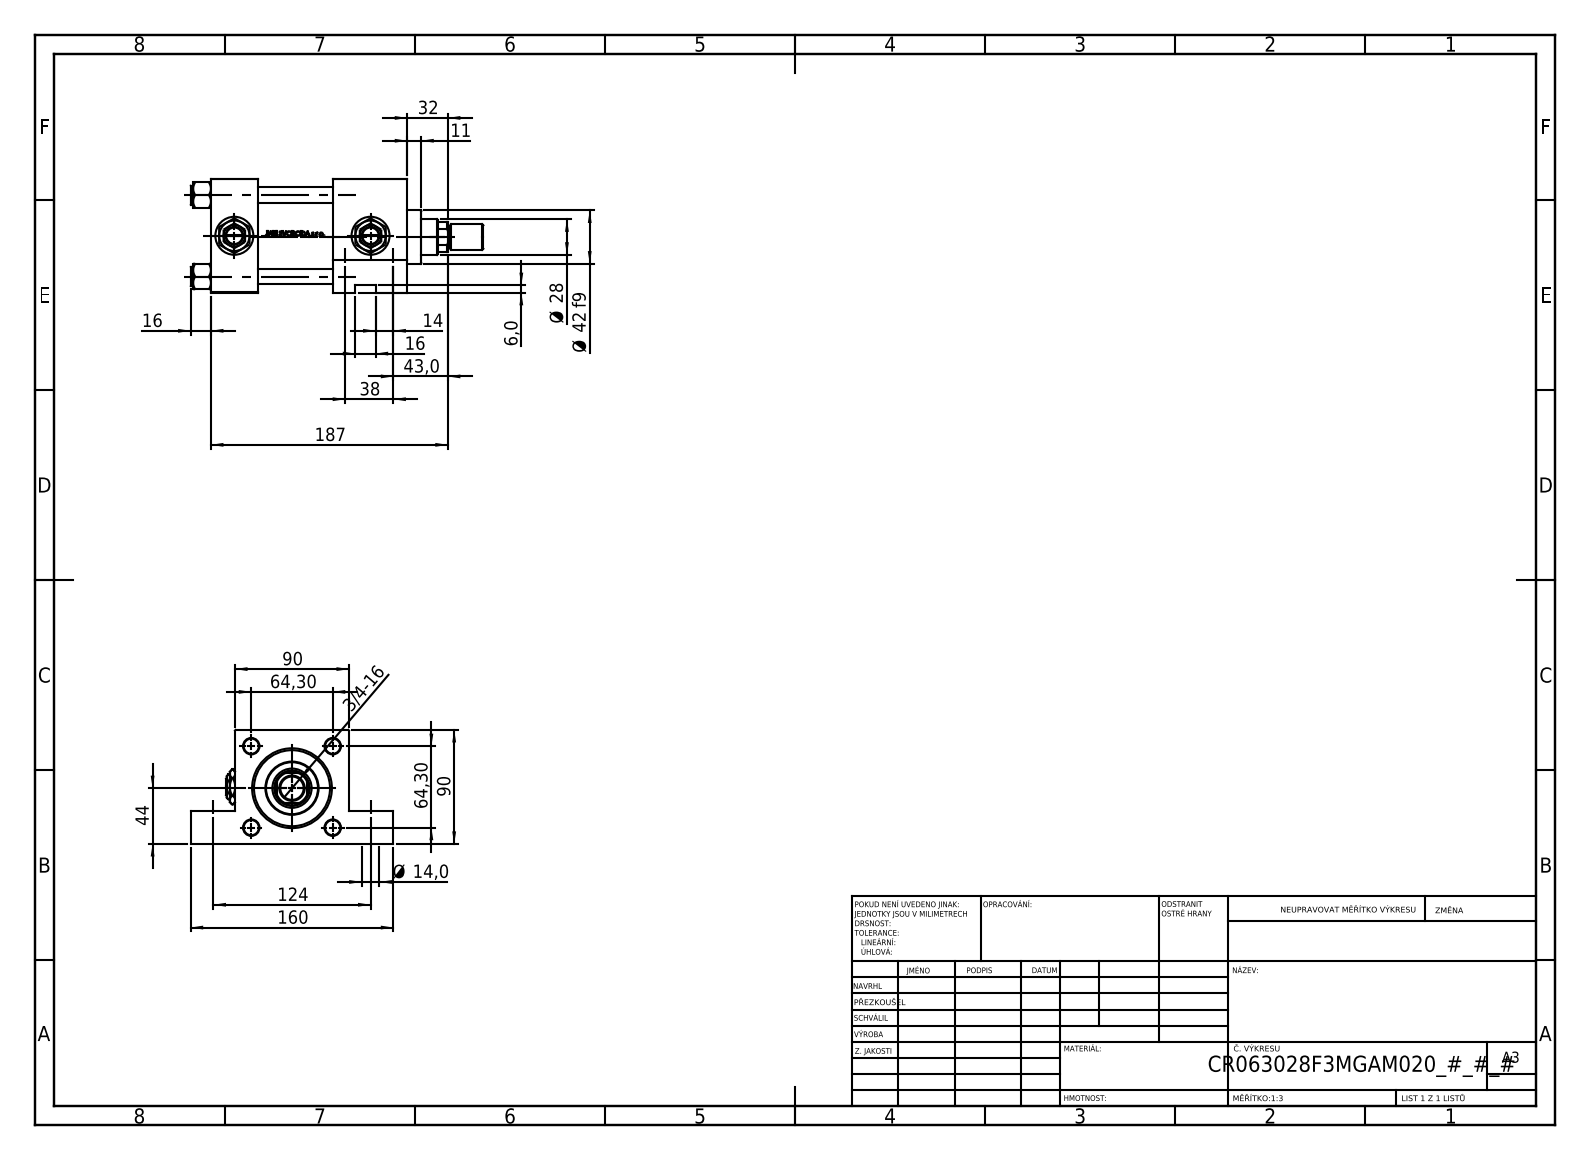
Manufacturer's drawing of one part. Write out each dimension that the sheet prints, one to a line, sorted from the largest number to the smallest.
187
160
124
90
90
64,30
64,30
44
43,0
Ø 42 f9
38
32
Ø 28
16
16
14
Ø 14,0
11
6,0
3/4-16
